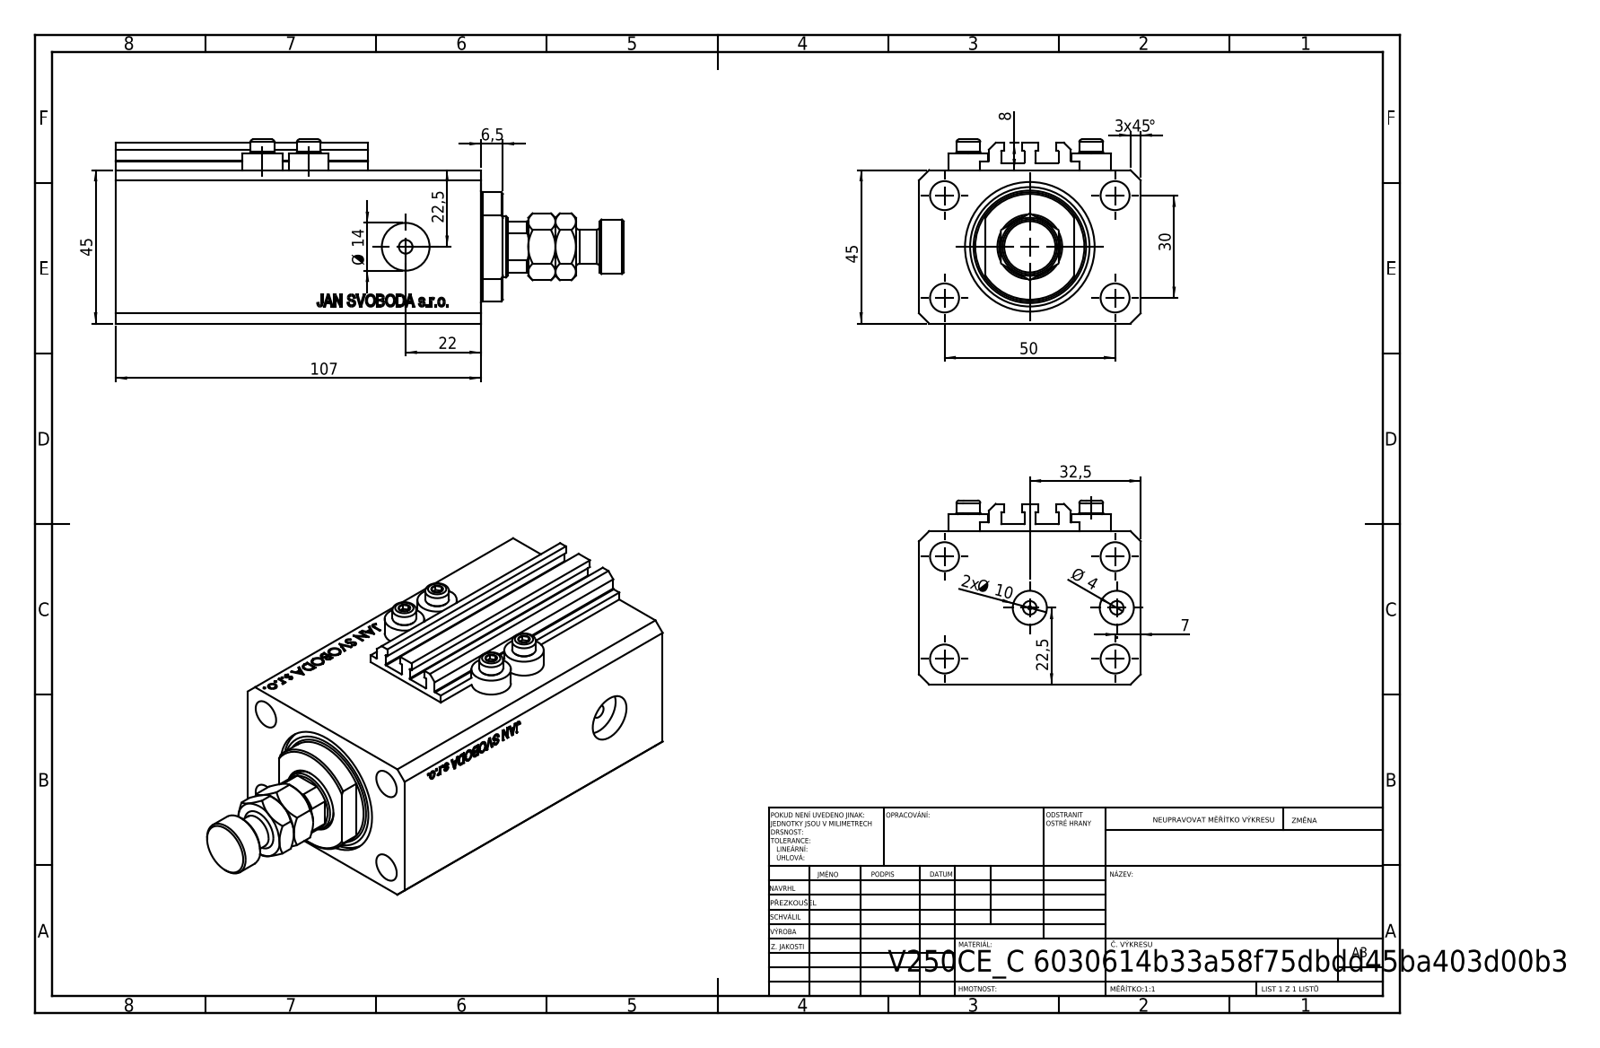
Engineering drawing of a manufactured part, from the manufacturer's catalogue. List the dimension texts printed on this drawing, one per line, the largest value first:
107
50
45
3 x45 °
45
32,5
30
22,5
22,5
22
Ø 14
2x Ø 10
8
7
6,5
Ø 4
